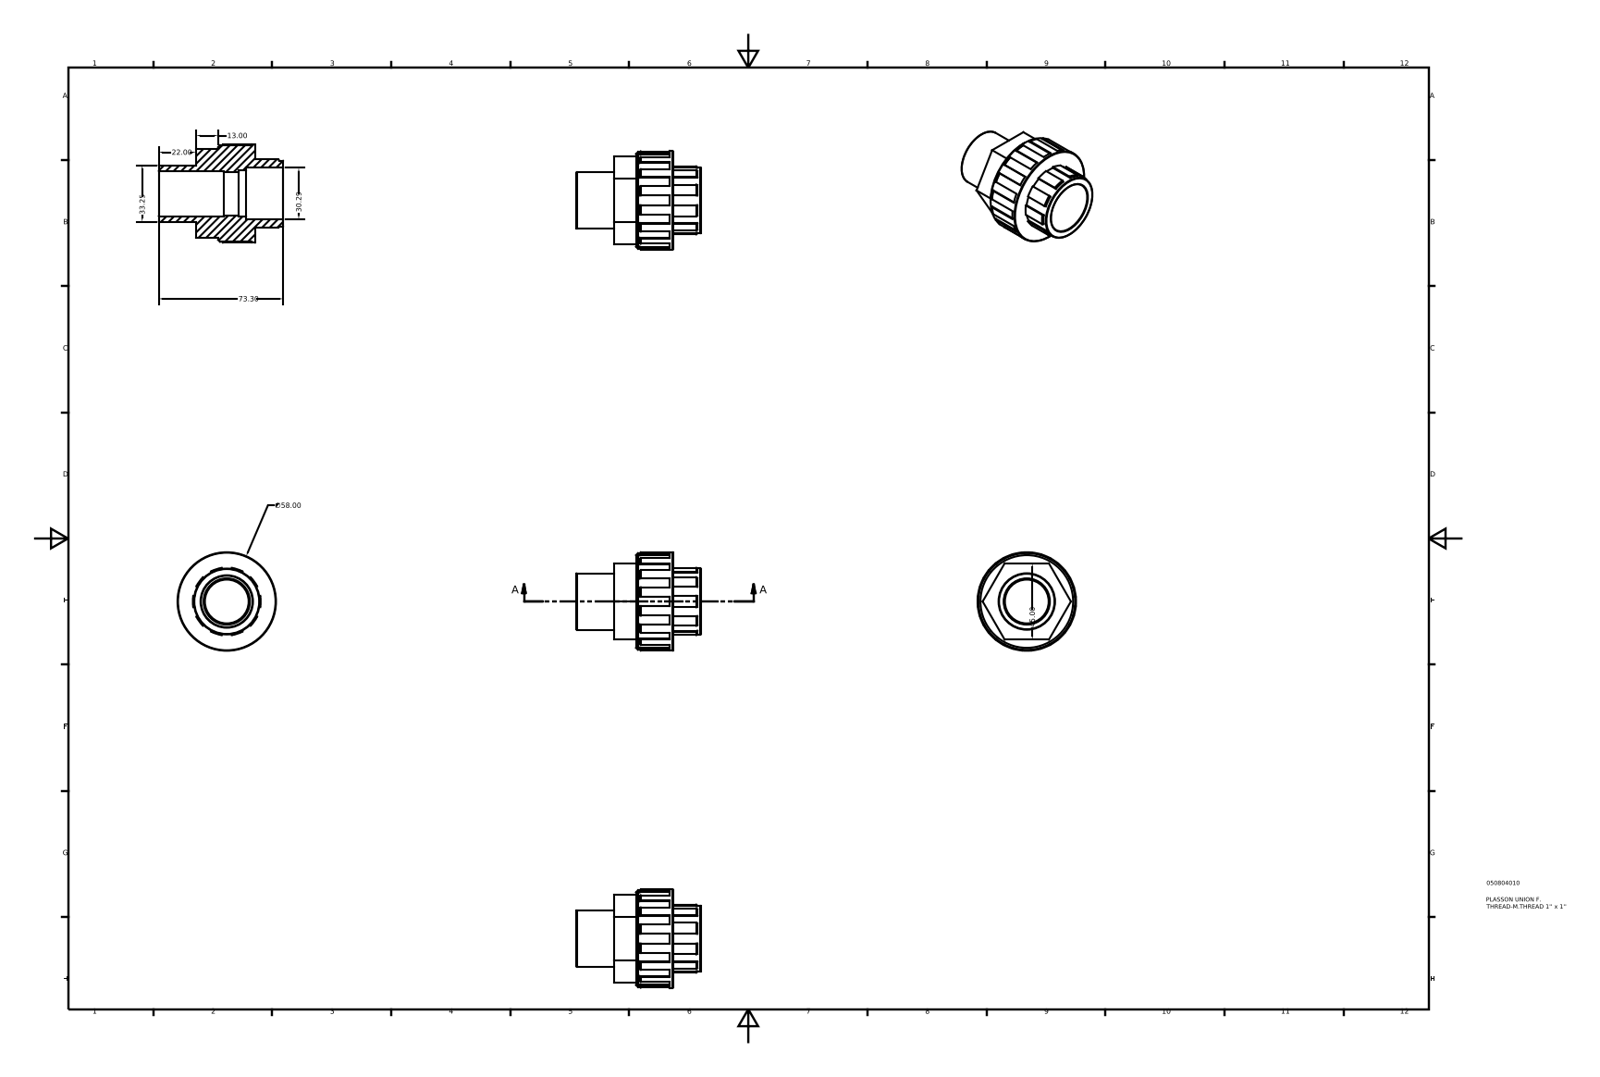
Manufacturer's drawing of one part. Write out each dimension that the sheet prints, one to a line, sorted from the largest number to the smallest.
73.30
∅58.00
45.00
33.25
30.29
22.00
13.00
